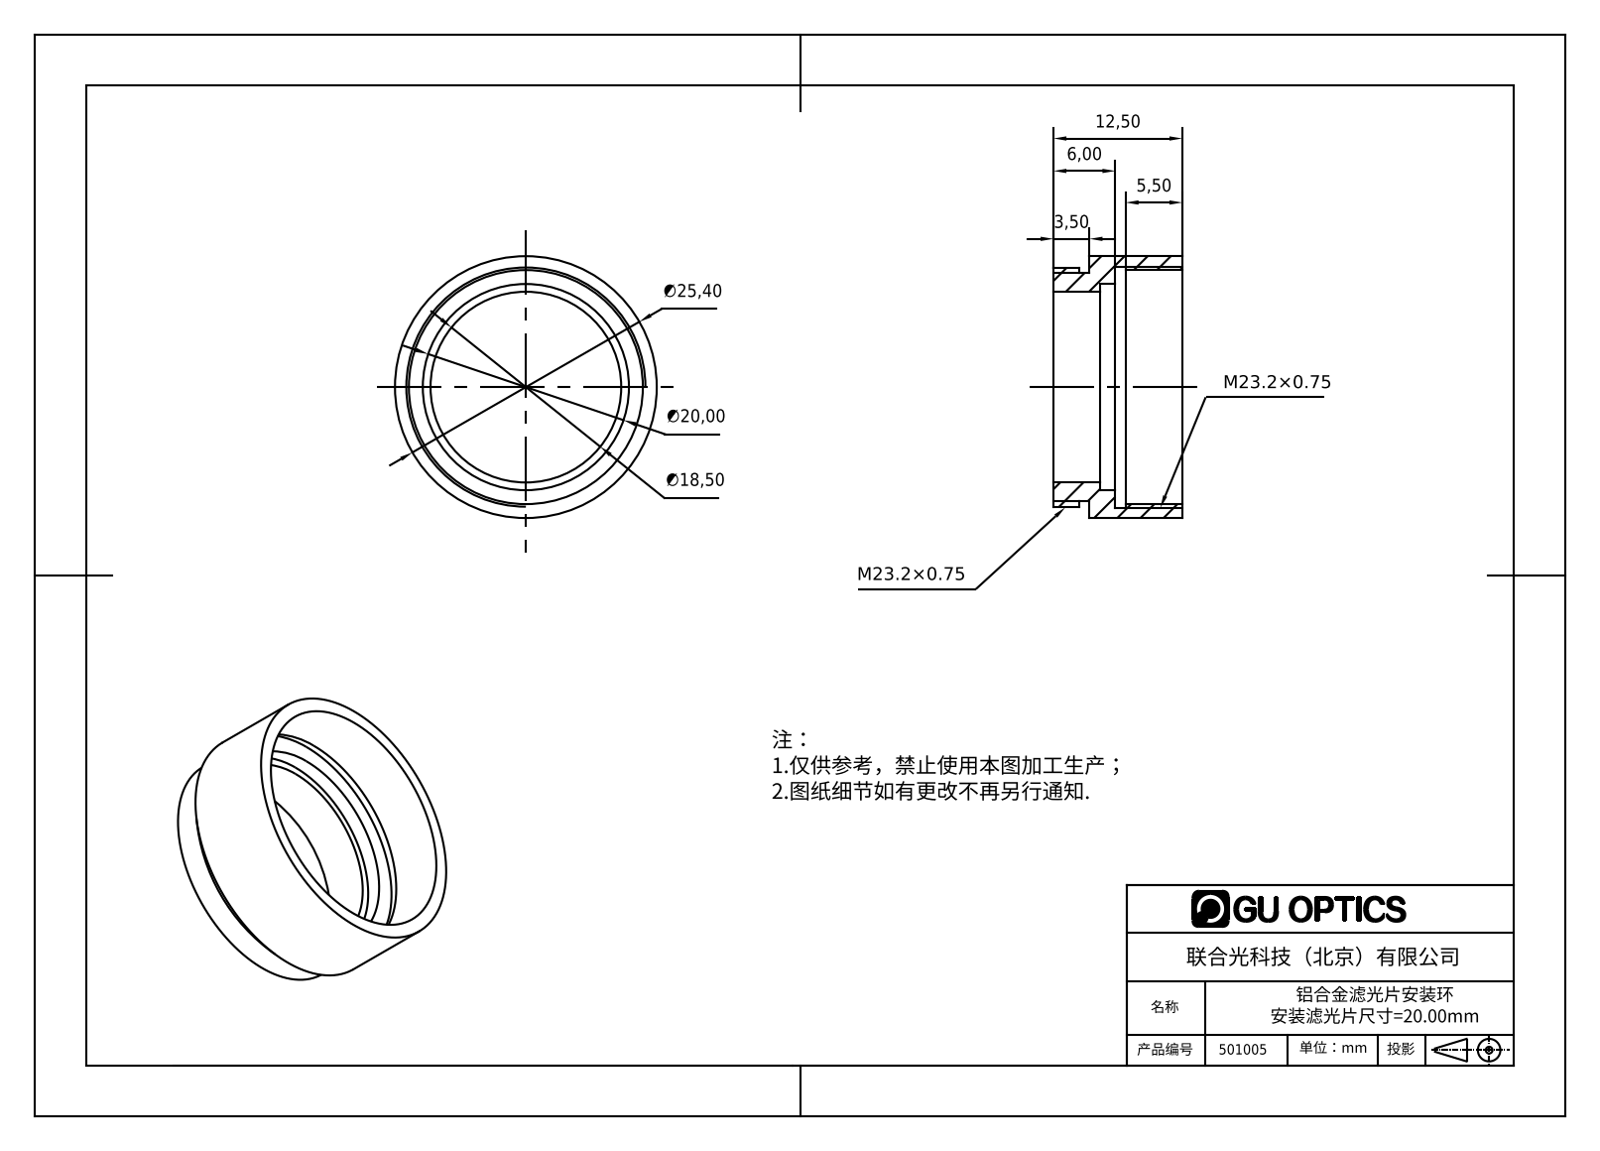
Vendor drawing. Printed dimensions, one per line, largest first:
∅25,40
∅20,00
∅18,50
12,50
6,00
5,50
3,50
